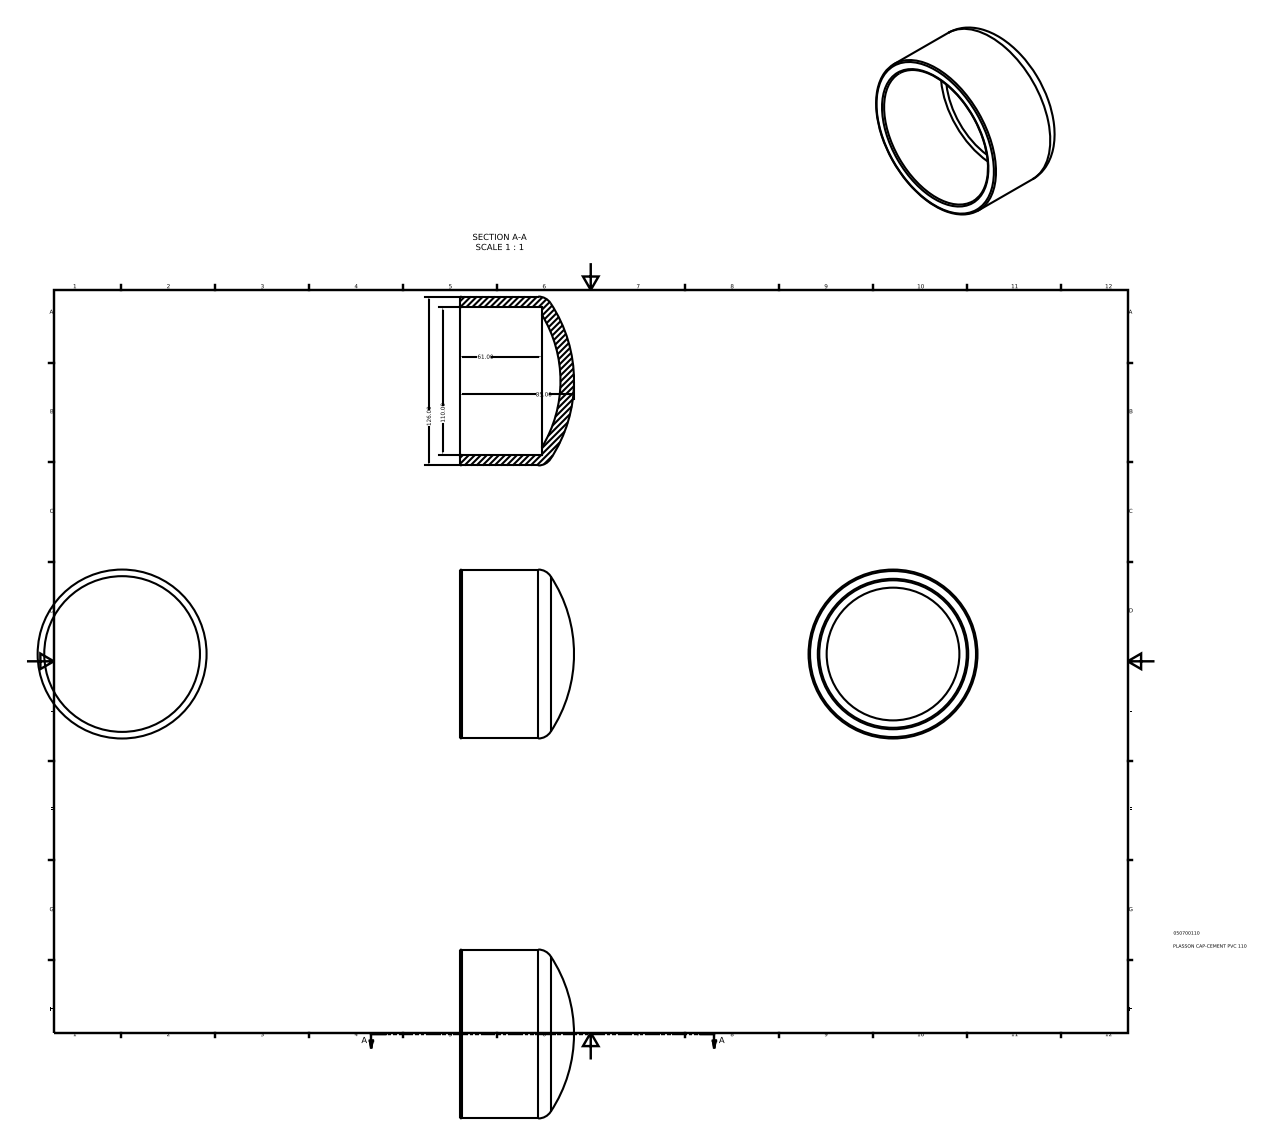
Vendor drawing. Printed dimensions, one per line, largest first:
126.00
110.00
85.00
61.00
